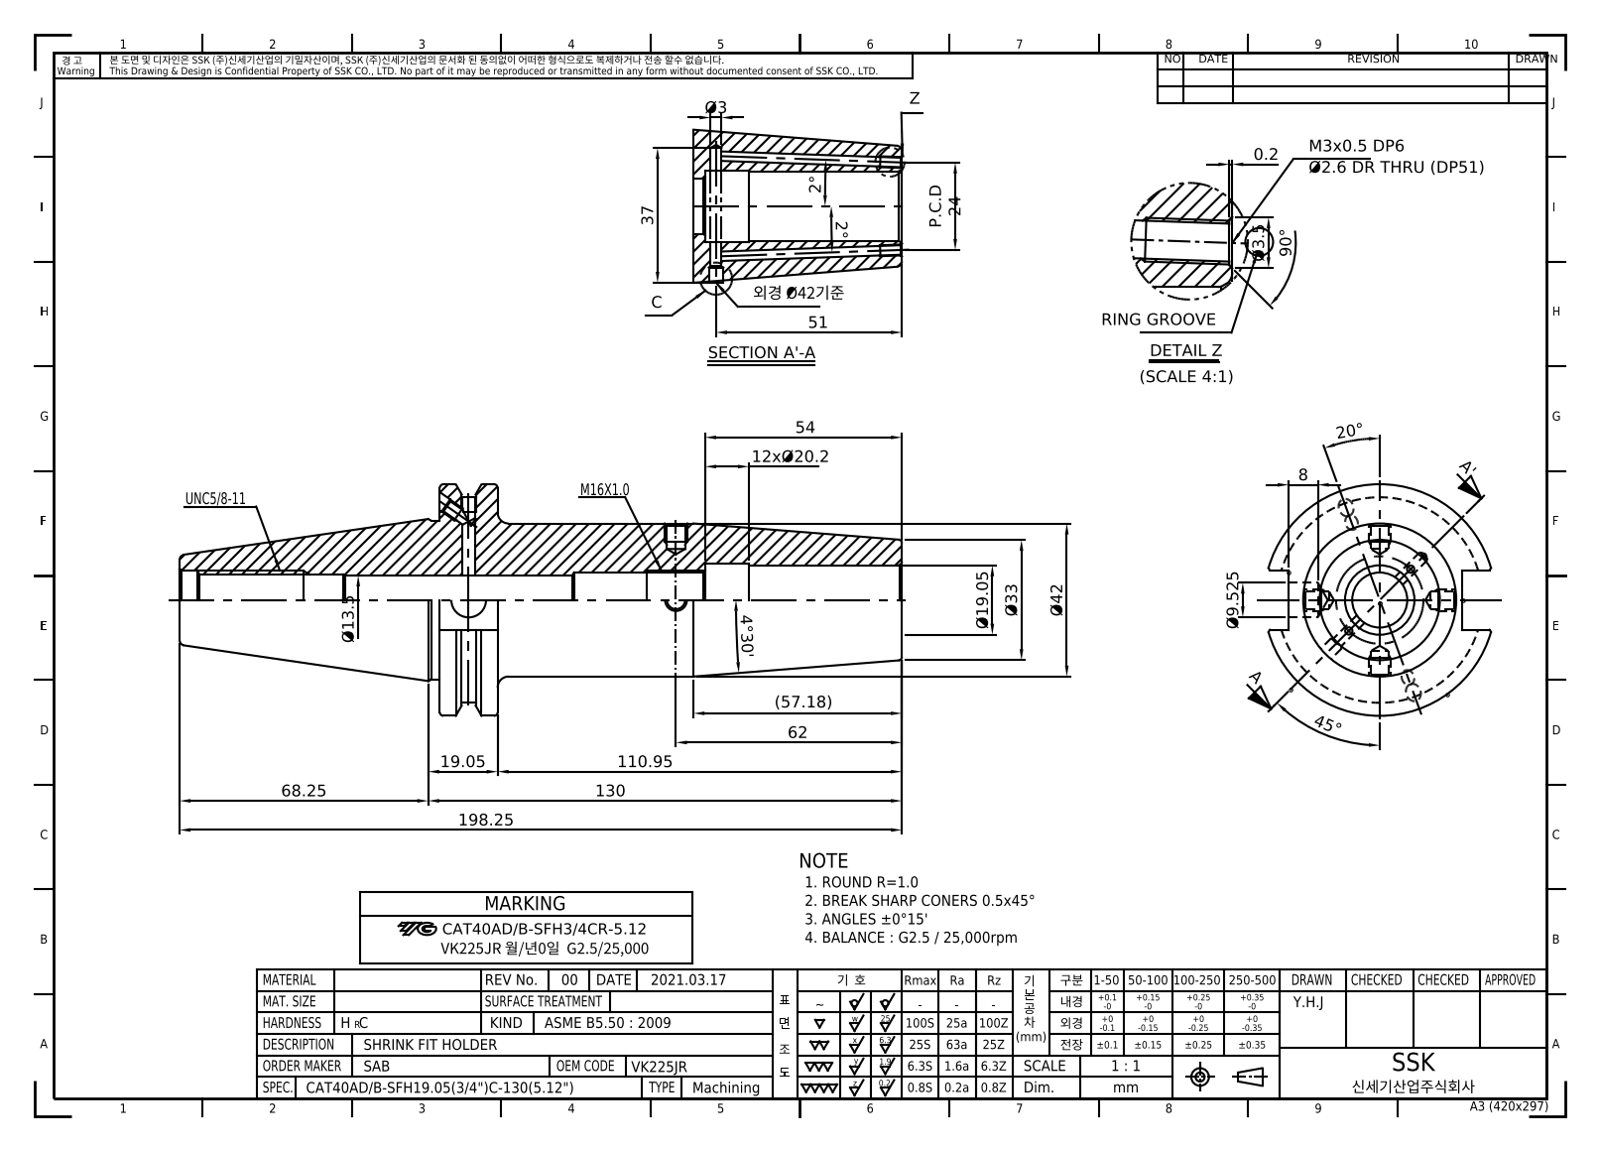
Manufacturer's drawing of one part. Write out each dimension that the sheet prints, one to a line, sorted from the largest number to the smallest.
198.25
130
110.95
90°
68.25
62
(57.18)
54
51
45°
Ø42
37
Ø33
P.C.D 24
12xØ20.2
20°
Ø19.05
19.05
Ø13.5
Ø9.525
8
4°30'
Ø3.5
Ø3
2°
2°
0.2
